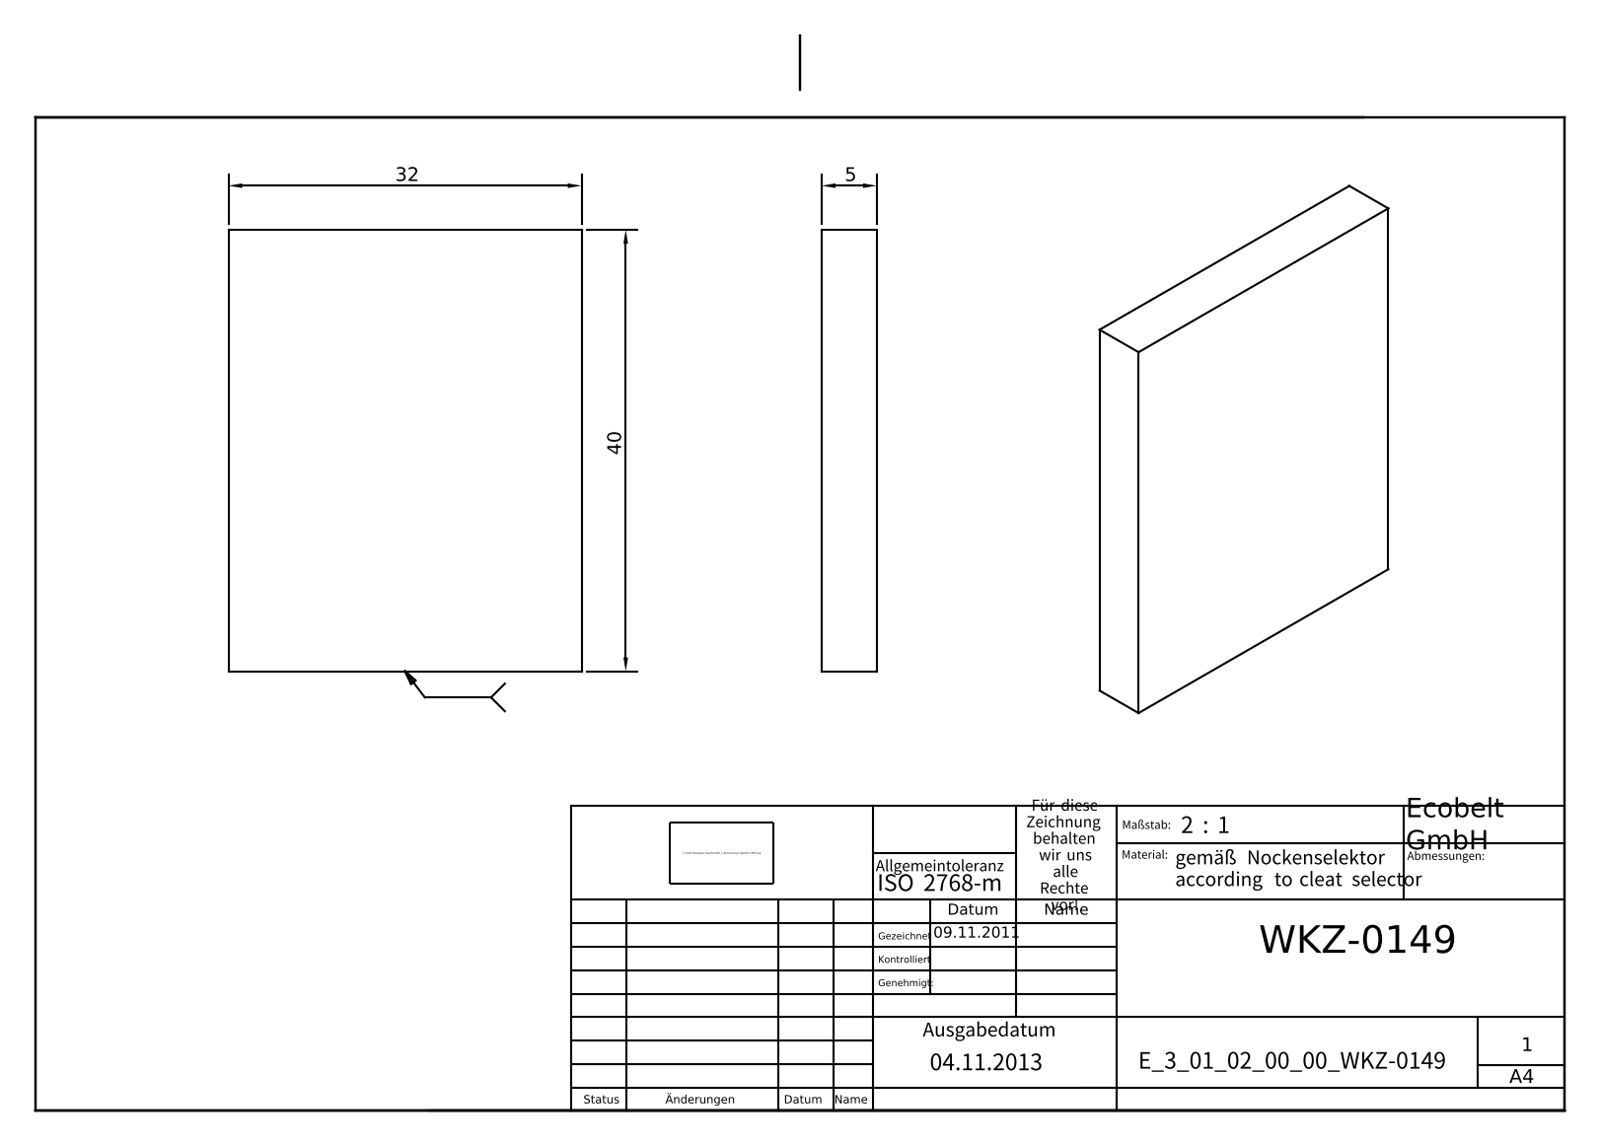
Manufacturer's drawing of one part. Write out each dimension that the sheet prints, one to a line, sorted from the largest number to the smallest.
40
32
5
